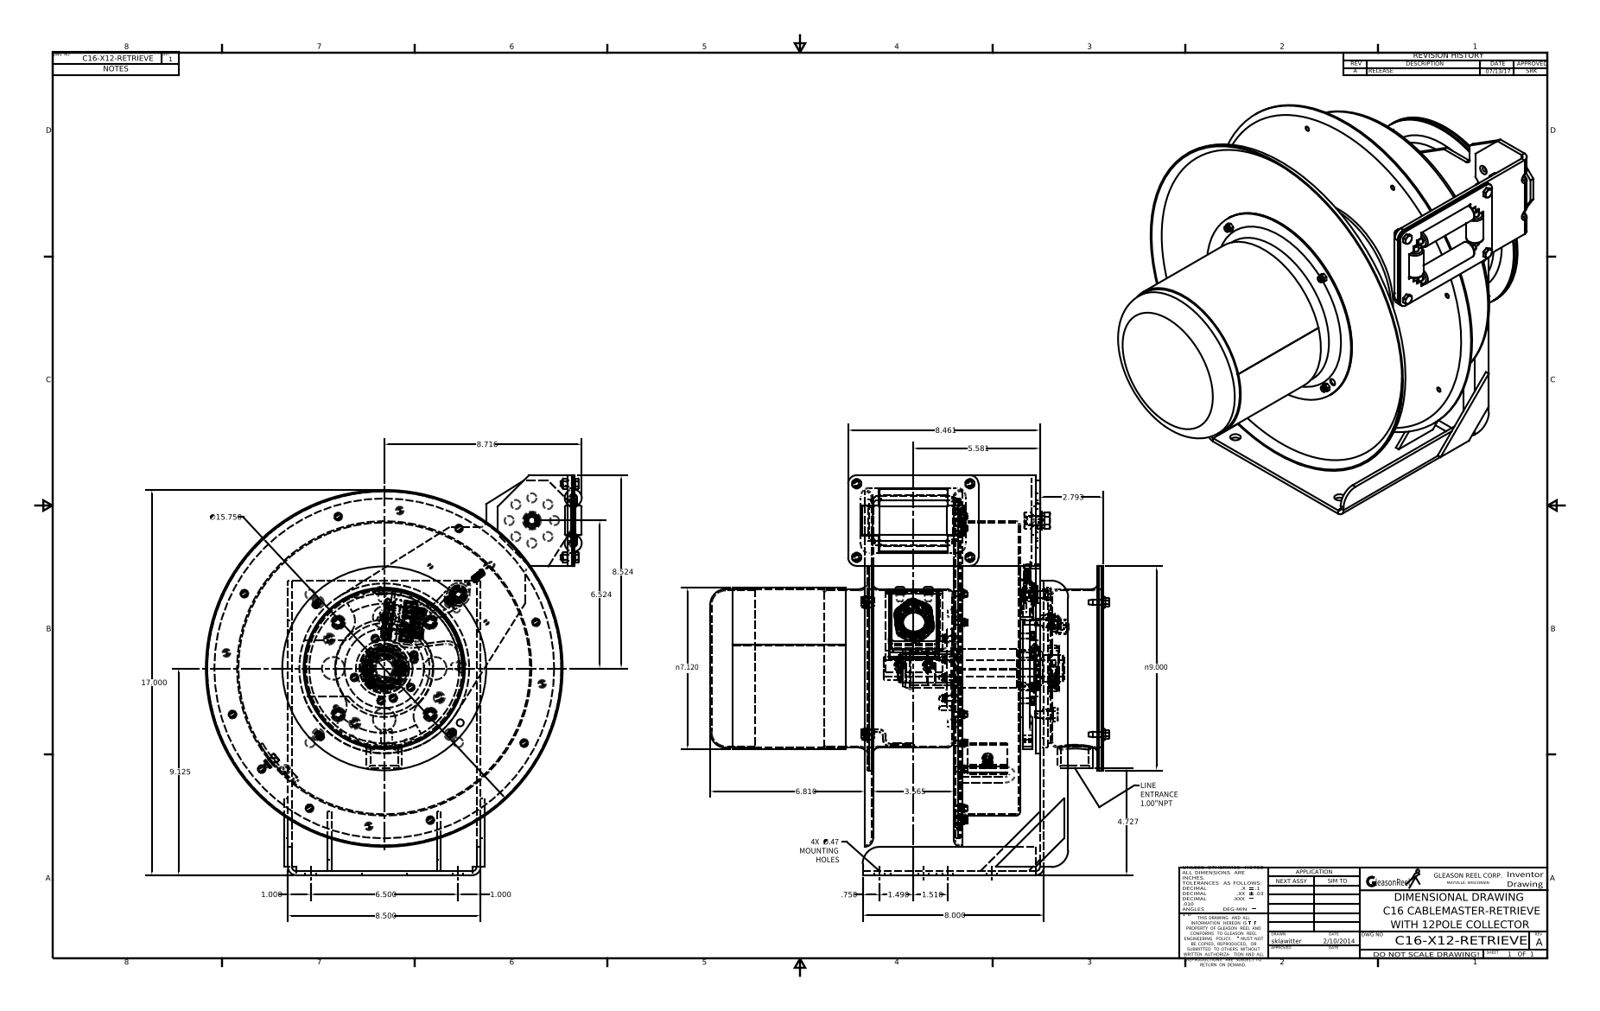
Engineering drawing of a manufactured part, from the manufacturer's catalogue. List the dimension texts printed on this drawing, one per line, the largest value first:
17.000
∅15.750
9.125
n9.000
8.716
8.524
8.500
8.461
8.000
n7.120
6.810
6.524
6.500
5.581
4.727
3.565
2.793
1.510
1.490
1.000
1.000
.750
